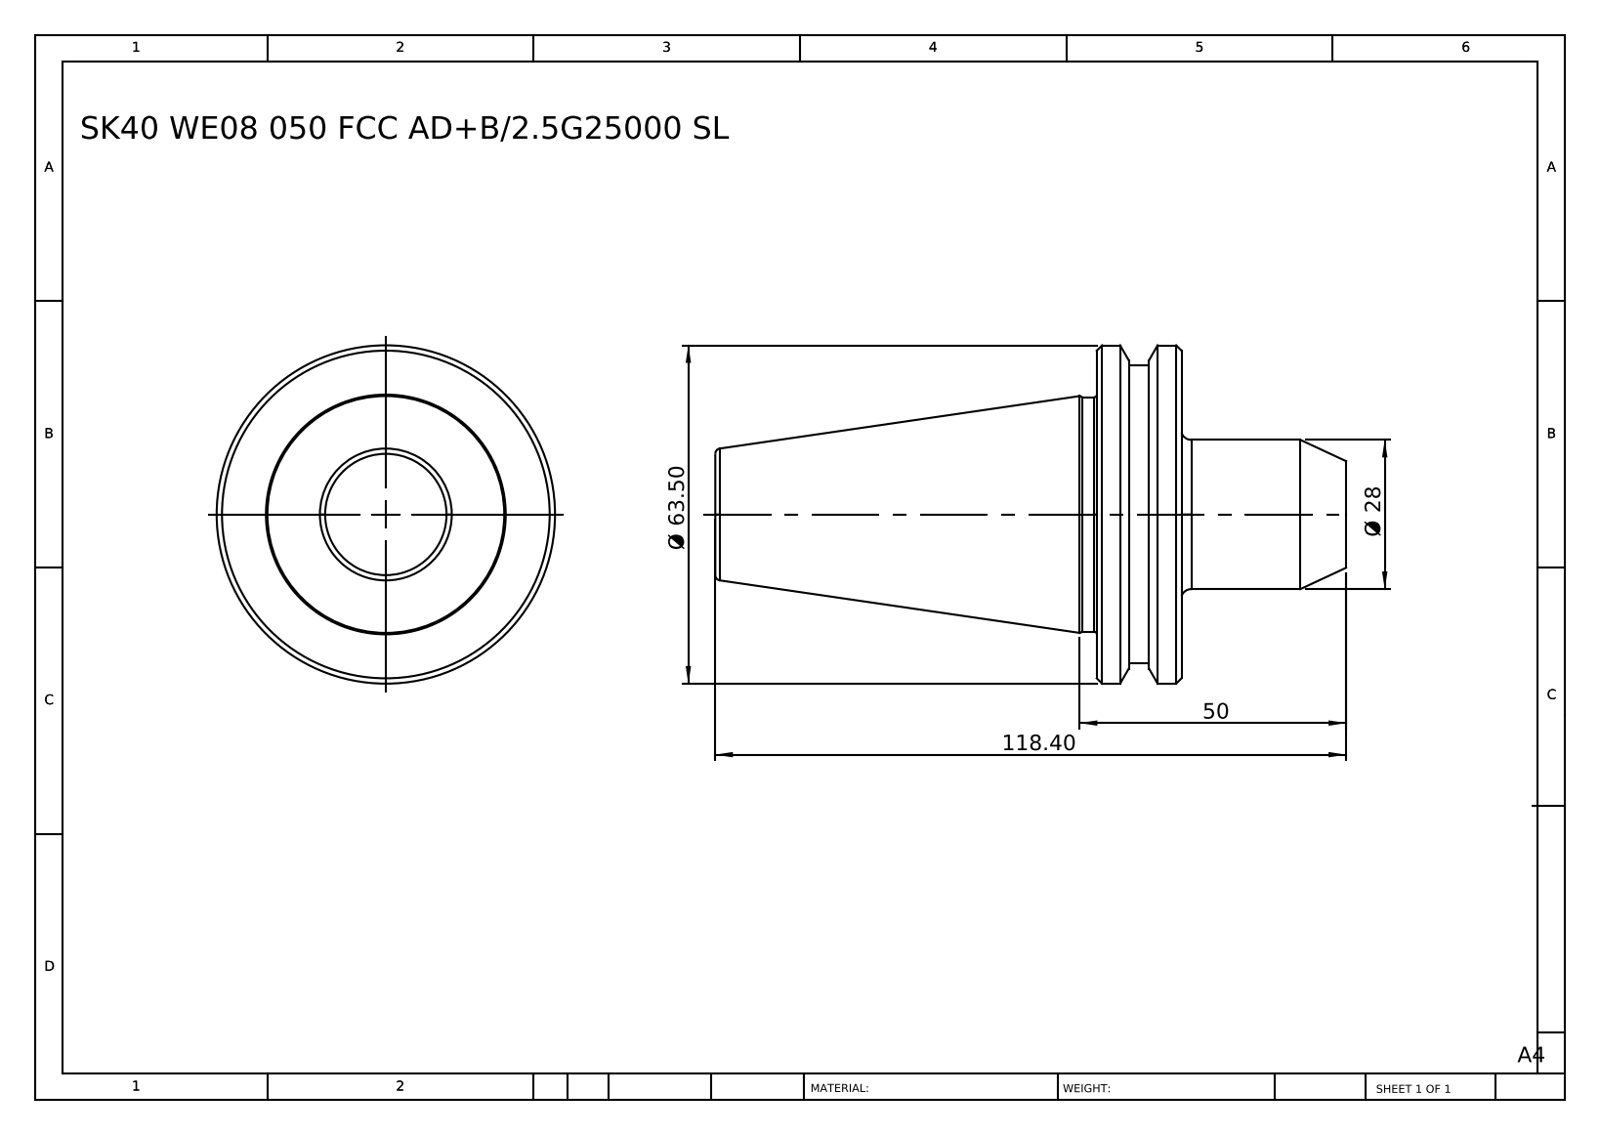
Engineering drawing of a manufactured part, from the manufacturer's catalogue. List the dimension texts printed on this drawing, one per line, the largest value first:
118.40
Ø 63.50
50
Ø 28
